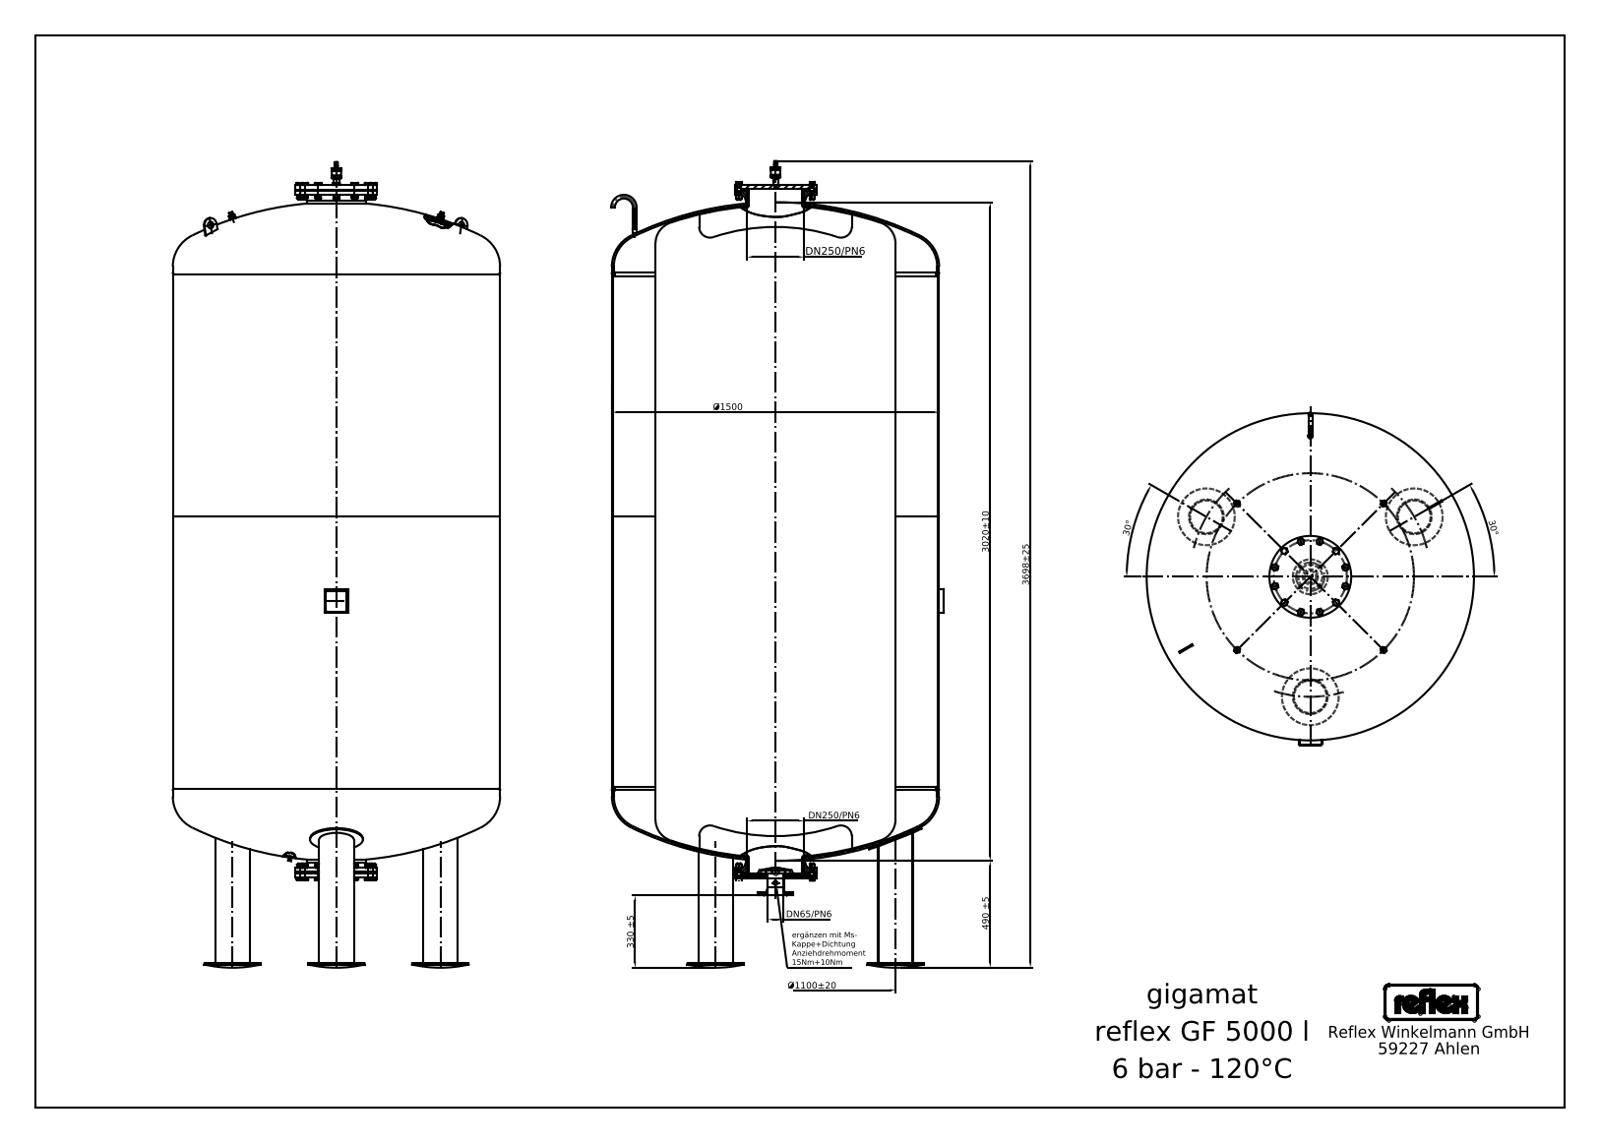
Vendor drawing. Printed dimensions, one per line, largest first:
3698±25
3020±10
Ø1500
Ø1100±20
490 ±5
330 ±5
DN250/PN6
DN250/PN6
DN65/PN6
30°
30°
